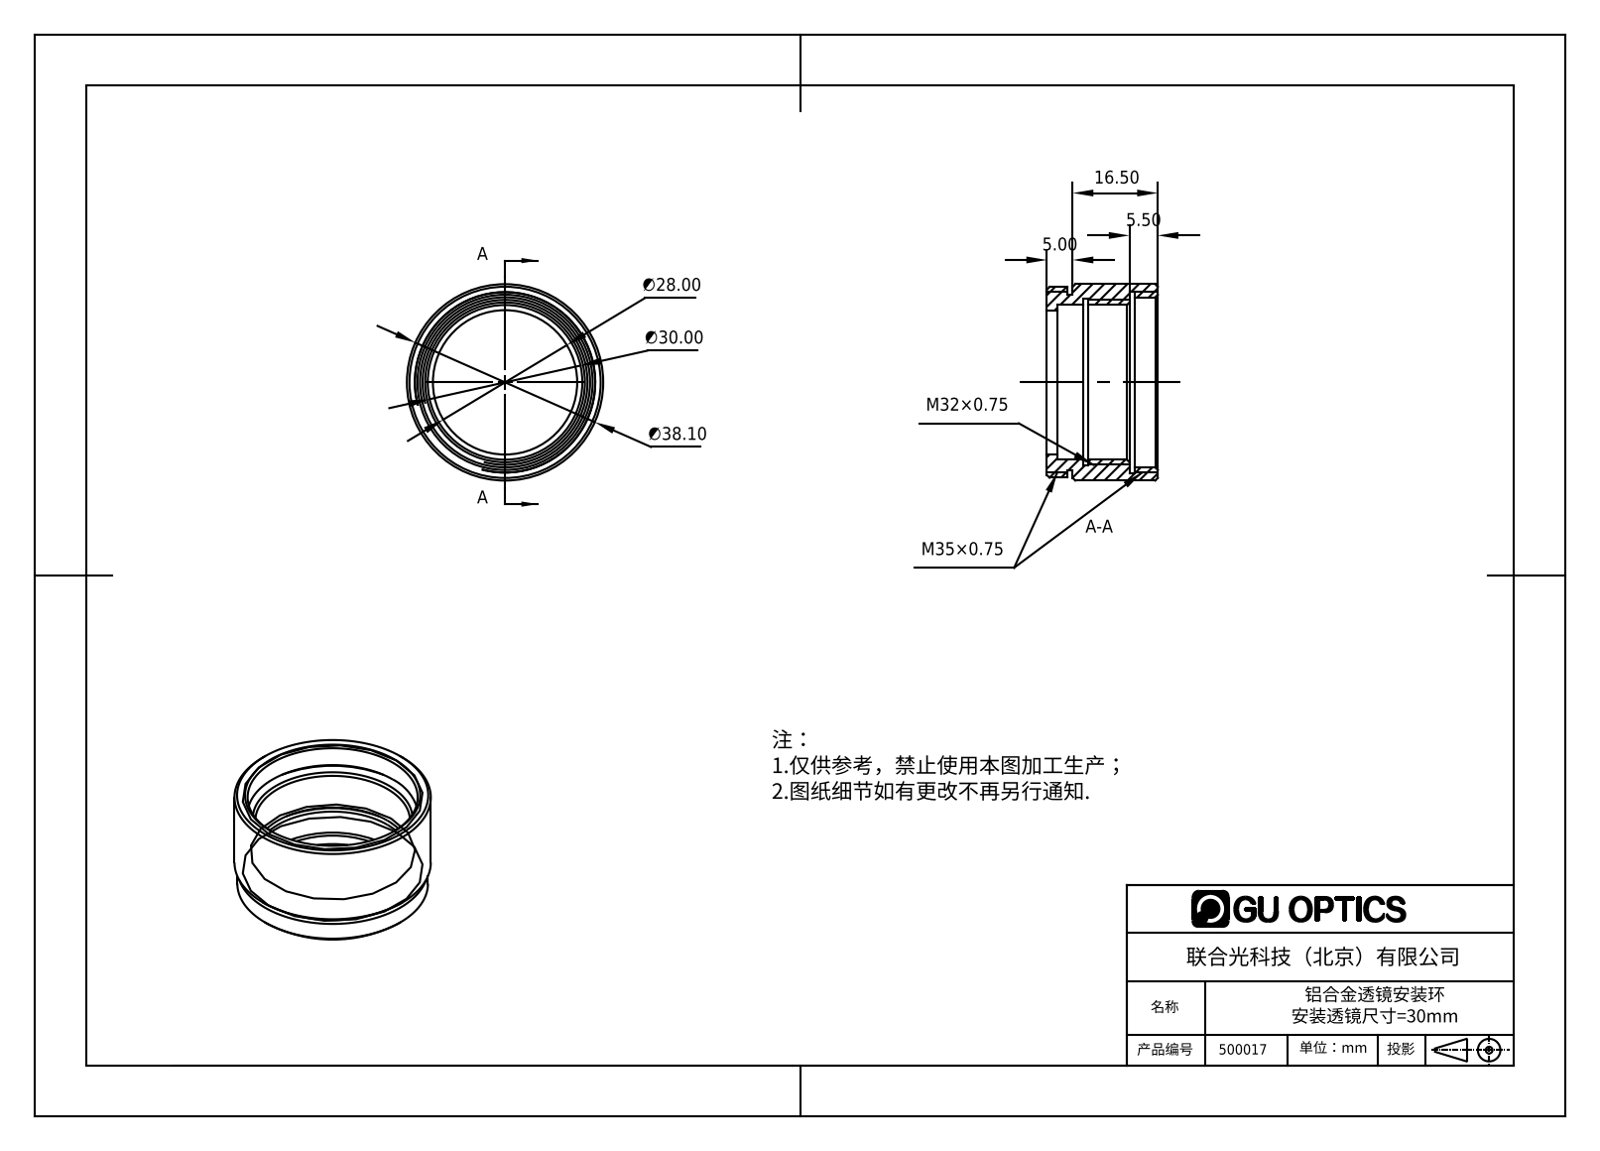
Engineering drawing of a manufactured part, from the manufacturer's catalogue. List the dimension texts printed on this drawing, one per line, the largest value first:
∅38.10
∅30.00
∅28.00
16.50
5.50
5.00
